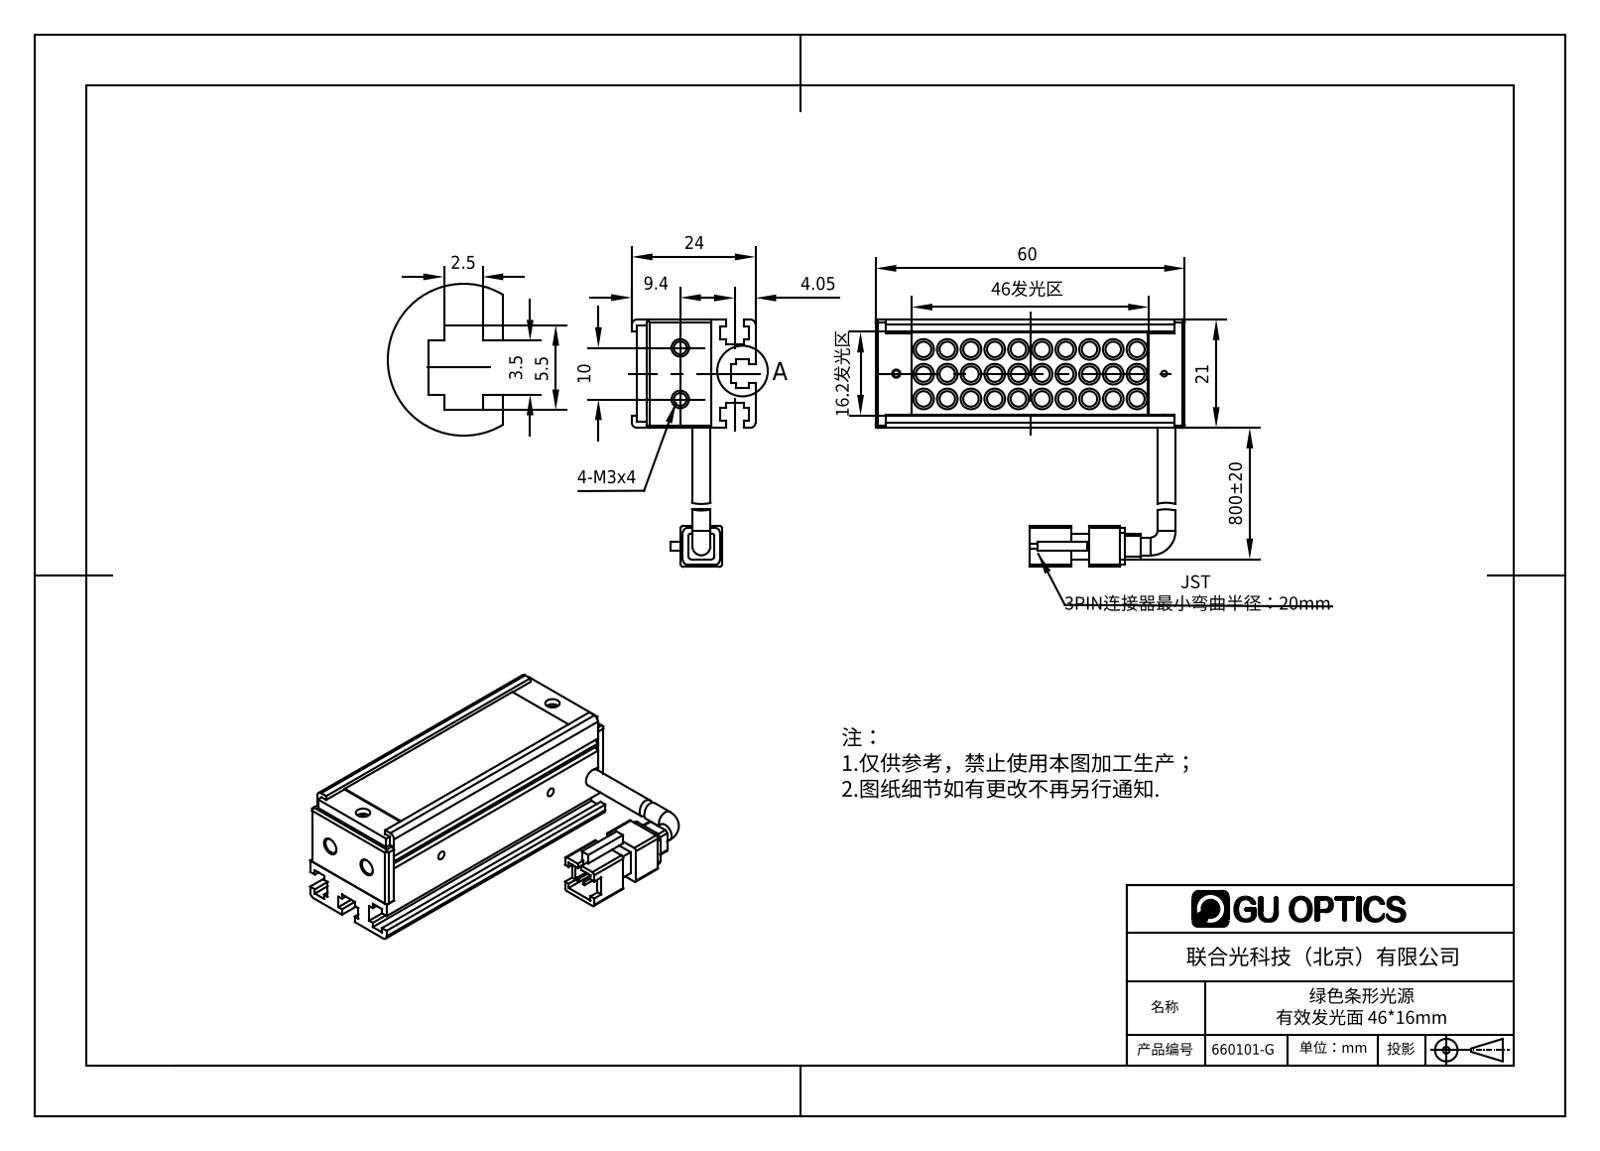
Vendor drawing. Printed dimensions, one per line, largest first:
800±20
60
46发光区
24
21
16.2发光区
10
9.4
5.5
4.05
3.5
2.5
